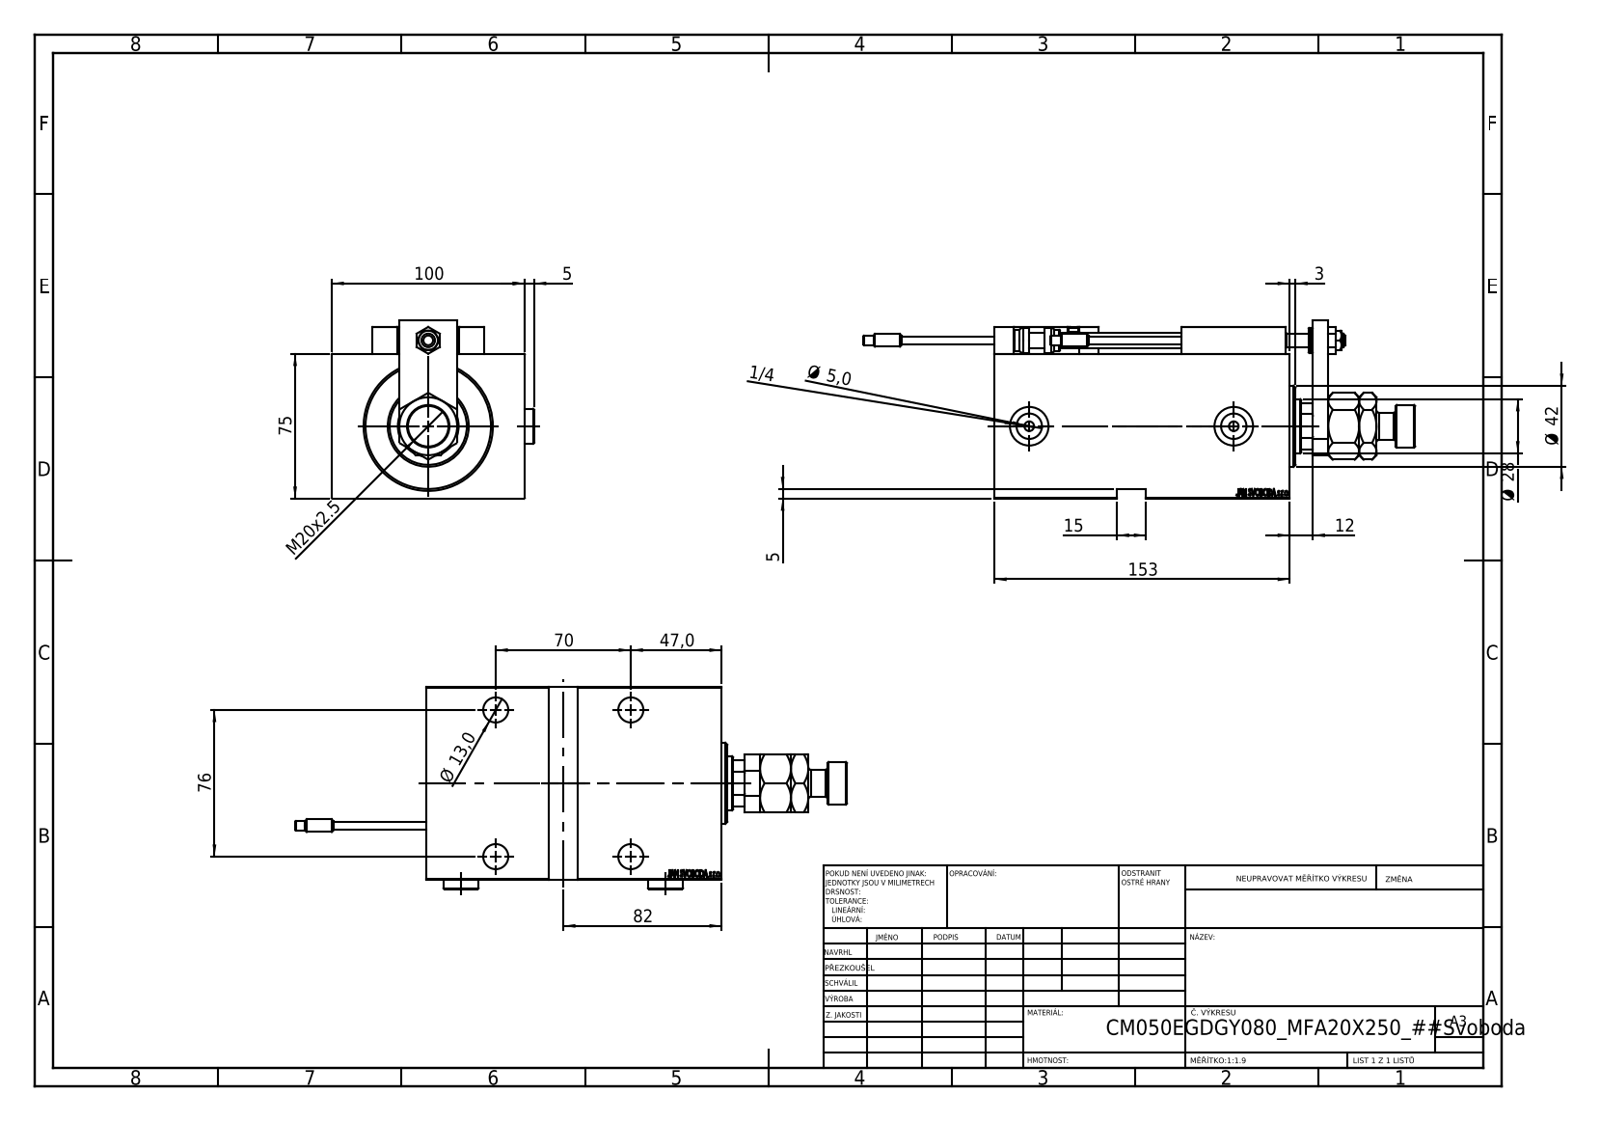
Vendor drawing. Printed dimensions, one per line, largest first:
153
100
82
76
75
70
47,0
Ø 42
Ø 28
M20x2.5
15
Ø 13,0
12
5
Ø 5,0
5
3
1/4
